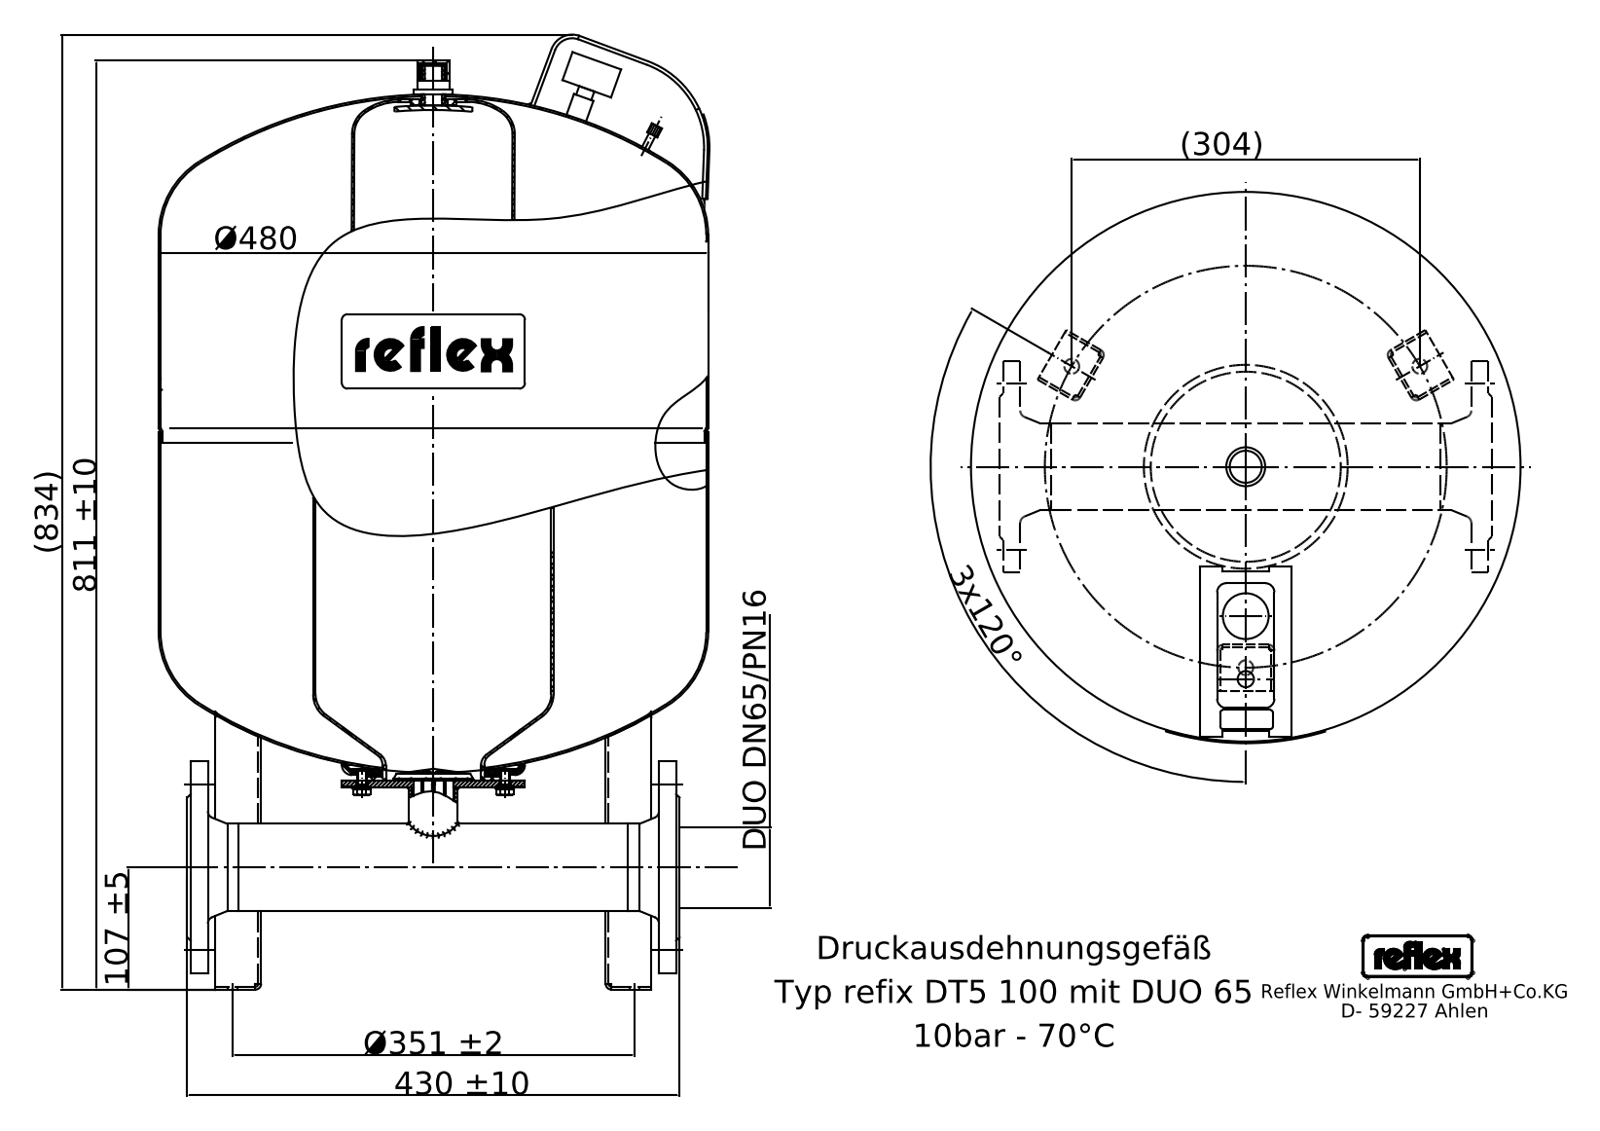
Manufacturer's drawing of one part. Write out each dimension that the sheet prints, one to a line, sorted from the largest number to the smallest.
(834)
811 ±10
Ø480
430 ±10
Ø351 ±2
(304)
3x120°
107 ±5
DUO DN65/PN16
